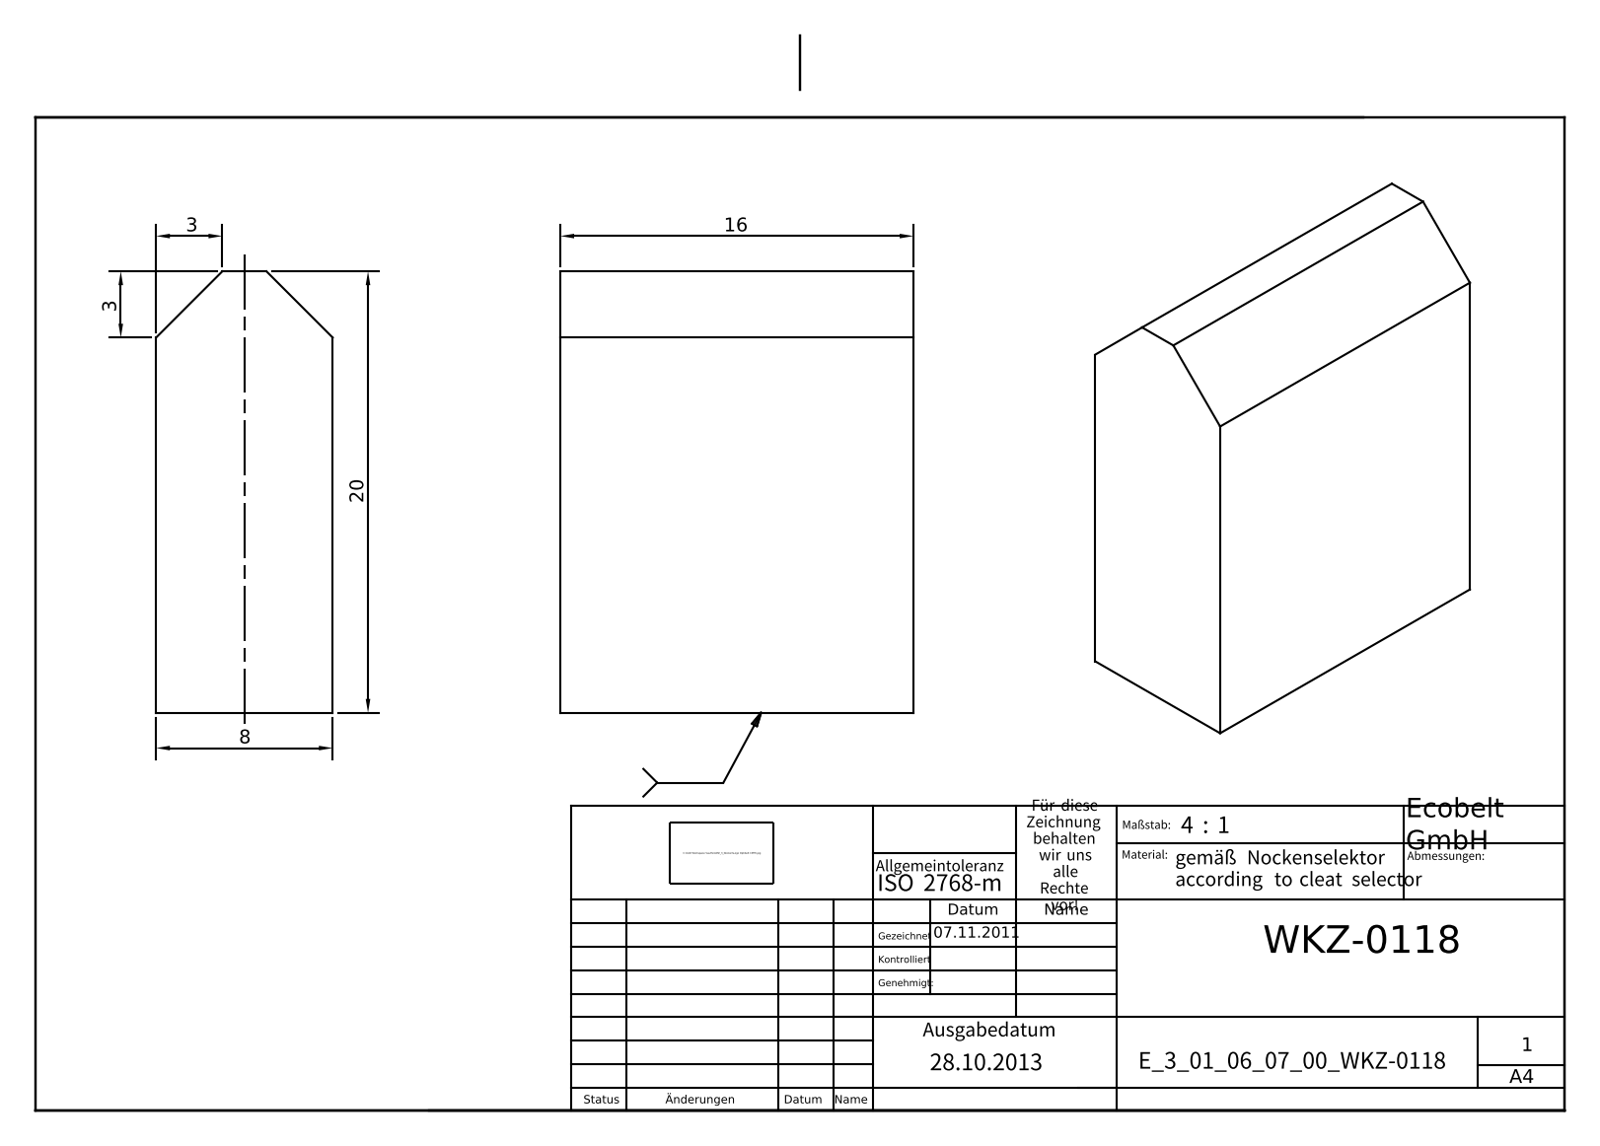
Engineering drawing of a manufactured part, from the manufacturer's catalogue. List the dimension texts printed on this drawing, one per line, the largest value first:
20
16
8
3
3
